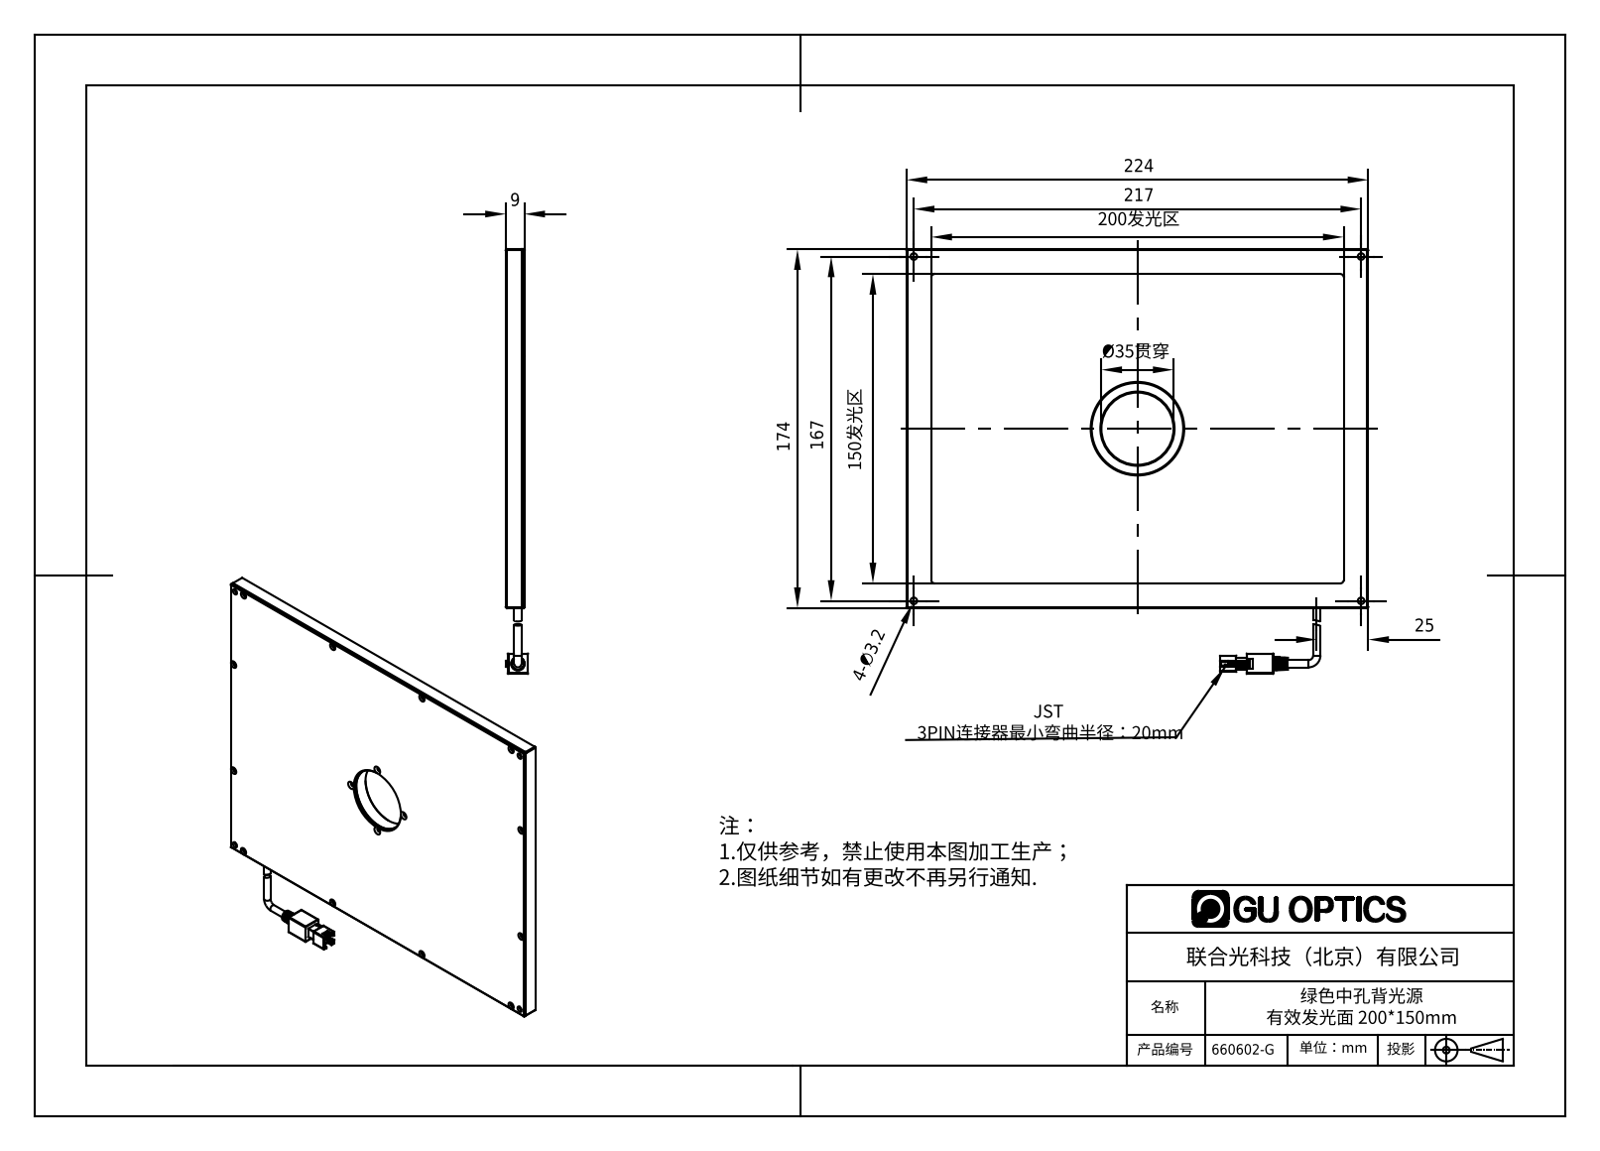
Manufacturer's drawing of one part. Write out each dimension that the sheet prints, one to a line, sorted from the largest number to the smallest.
224
217
200发光区
174
167
150发光区
Ø35贯穿
25
9
4-∅3.2
